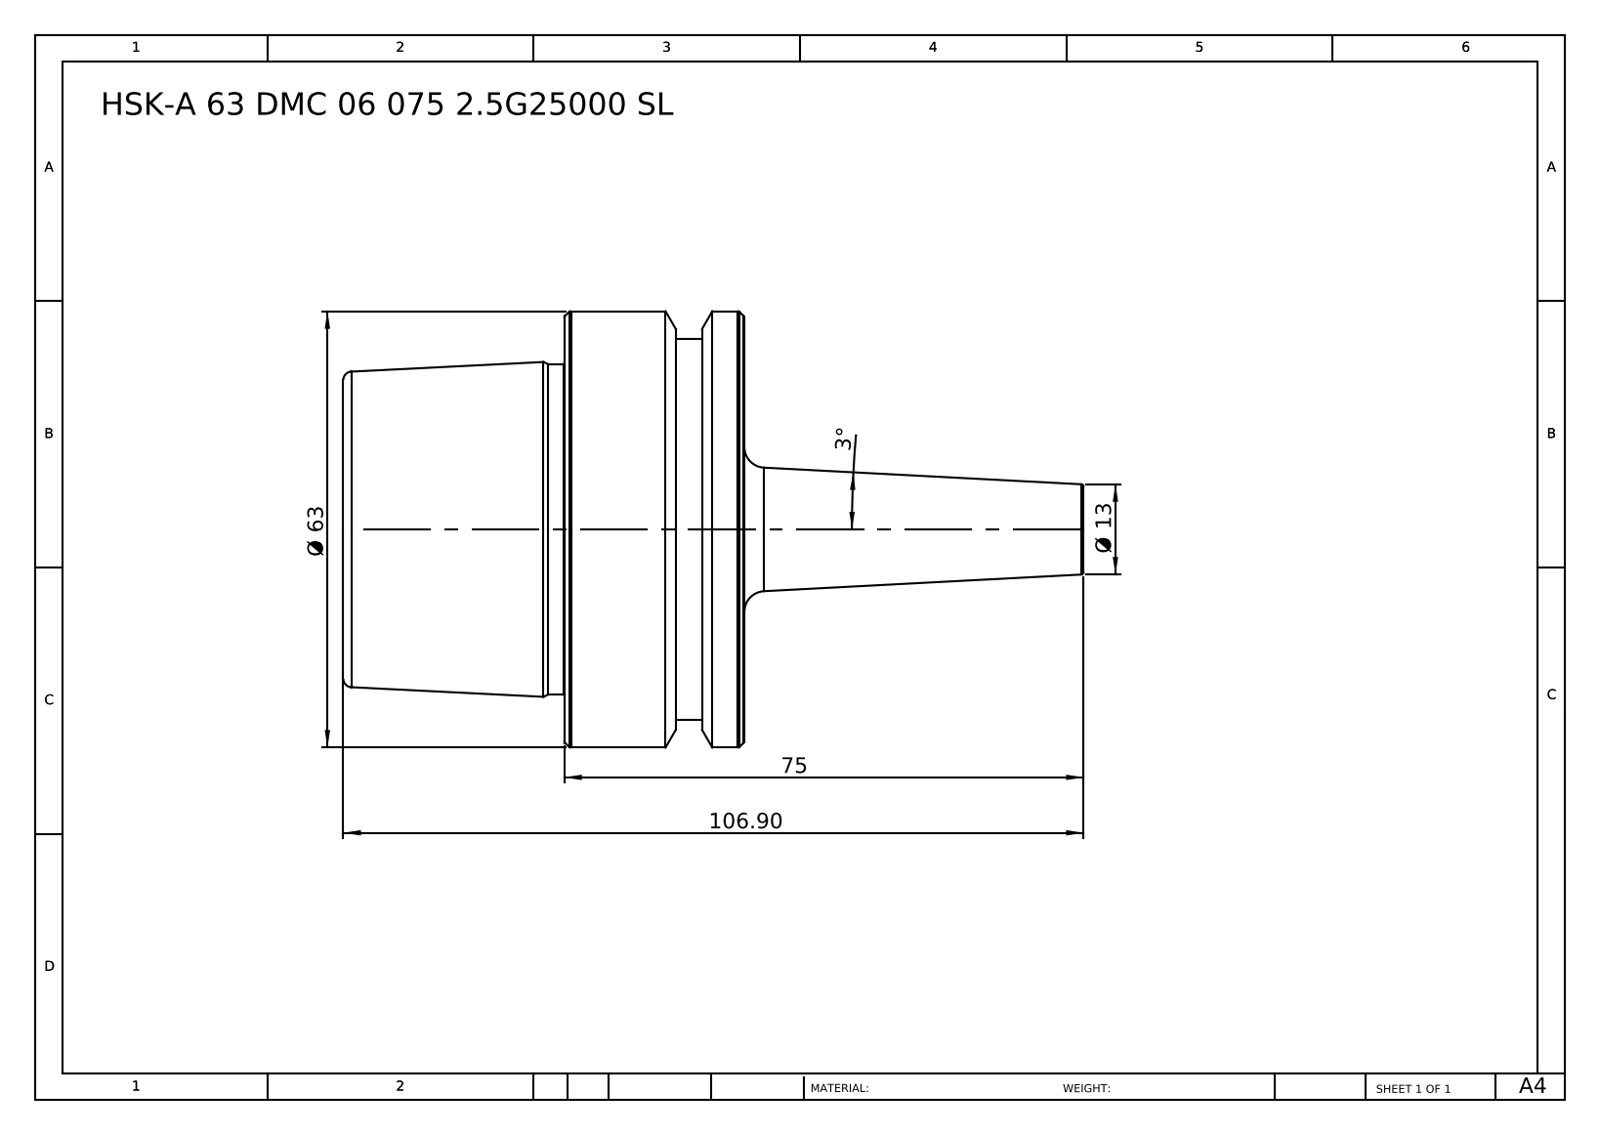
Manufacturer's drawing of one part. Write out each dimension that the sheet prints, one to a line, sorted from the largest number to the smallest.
106.90
75
Ø 63
Ø 13
3°
